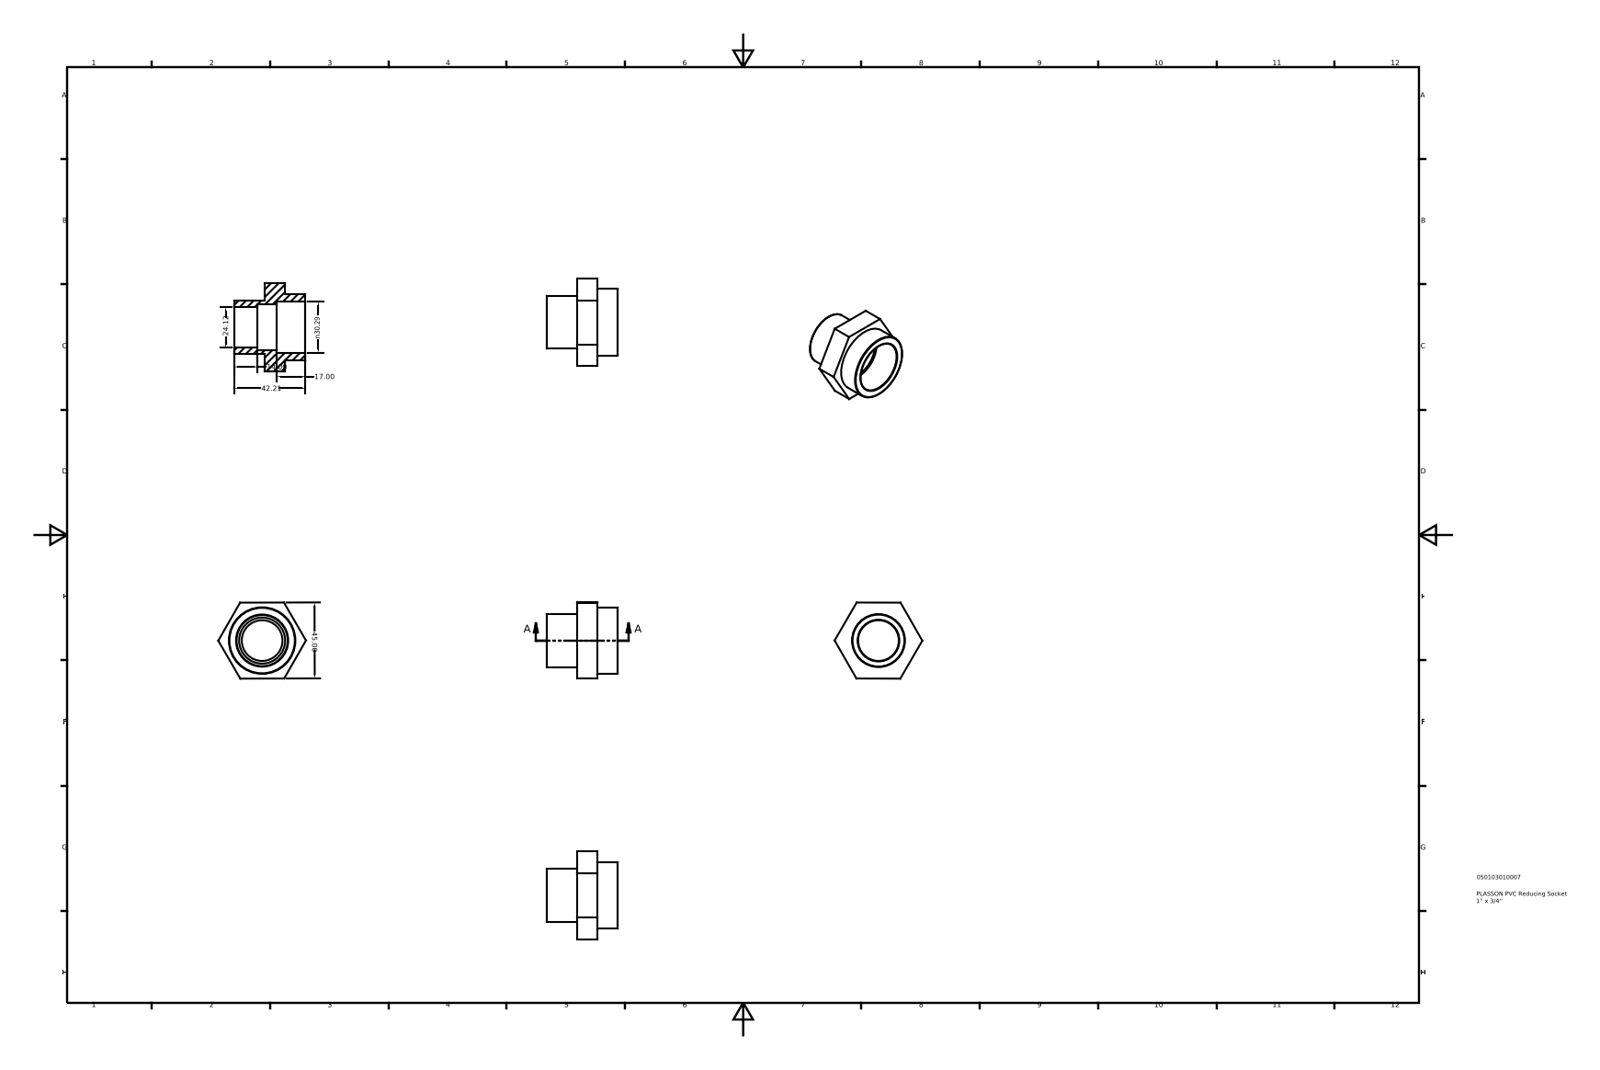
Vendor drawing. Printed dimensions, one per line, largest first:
45.00
42.21
n30.29
24.12
17.00
14.00
